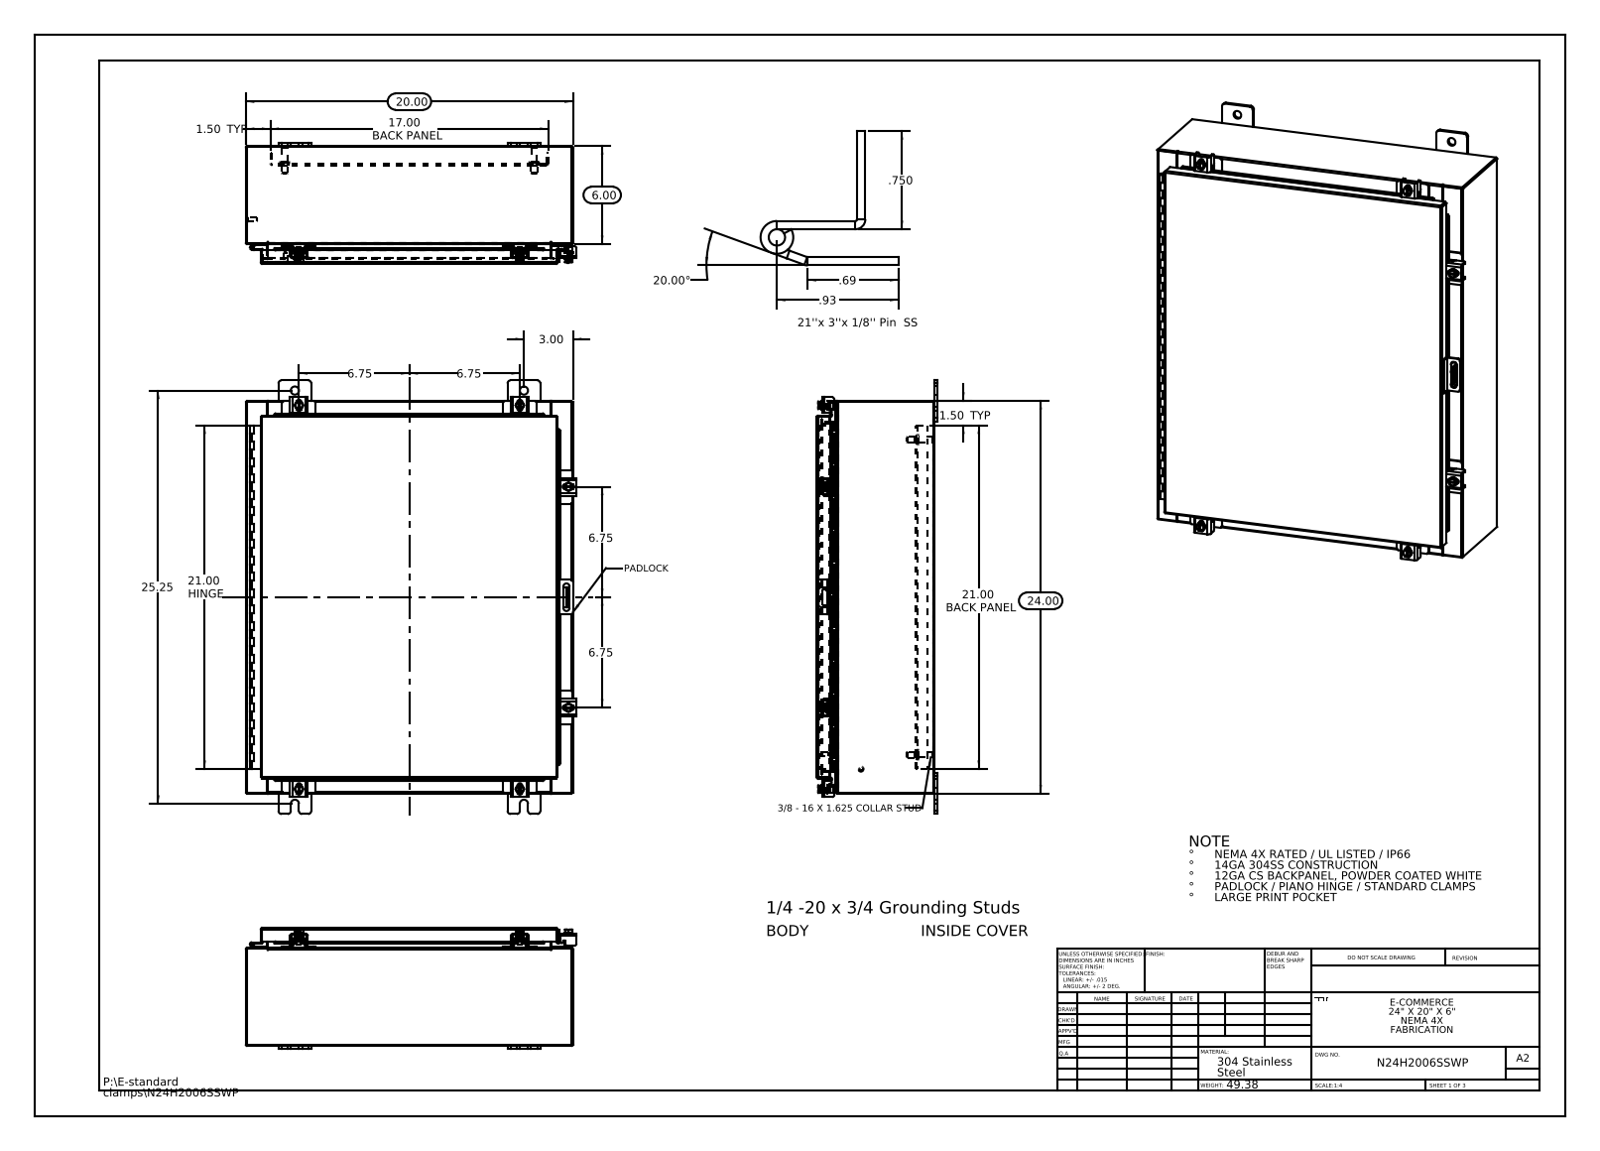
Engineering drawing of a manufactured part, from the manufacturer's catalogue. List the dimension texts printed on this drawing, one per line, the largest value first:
25.25
24.00
21.00 HINGE
21.00 BACK PANEL
20.00
20.00°
17.00 BACK PANEL
6.75
6.75
6.75
6.75
6.00
3.00
1.50 TYP
1.50 TYP
.93
.750
.69
